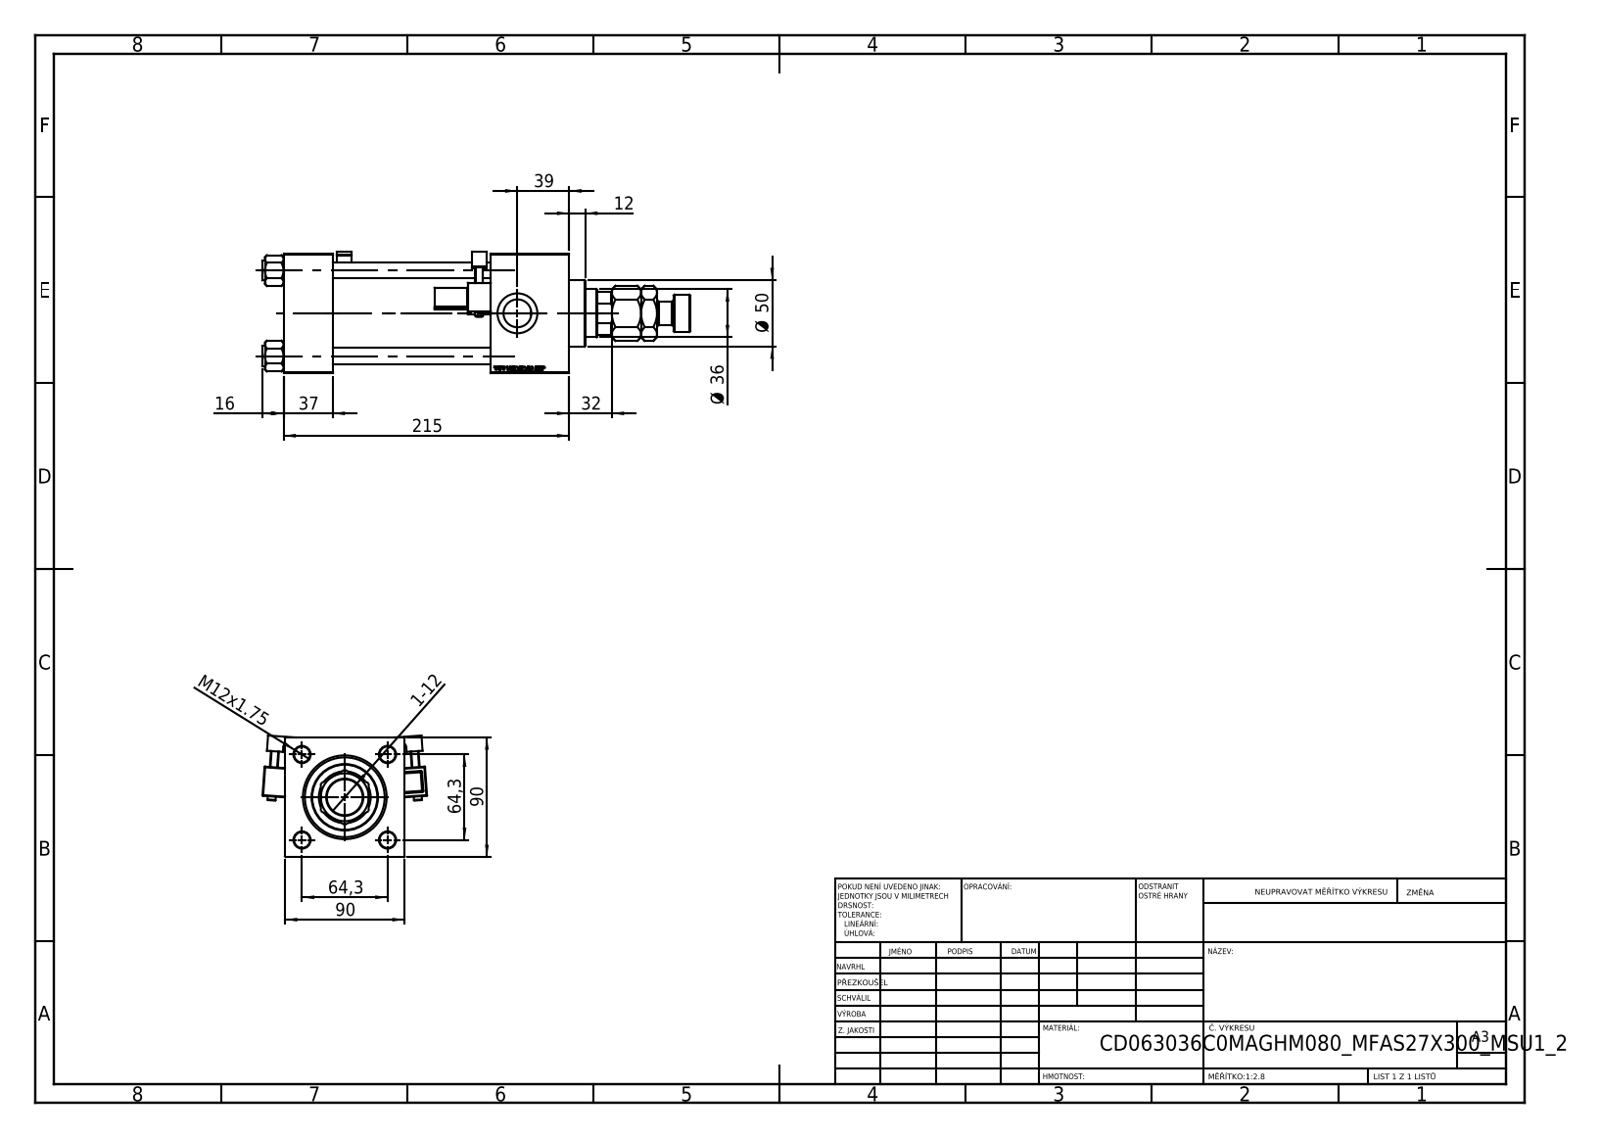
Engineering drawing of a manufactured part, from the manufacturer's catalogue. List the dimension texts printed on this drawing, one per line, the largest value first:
215
90
90
64,3
64,3
Ø 50
39
37
Ø 36
32
16
12
M12x1.75
1-12
